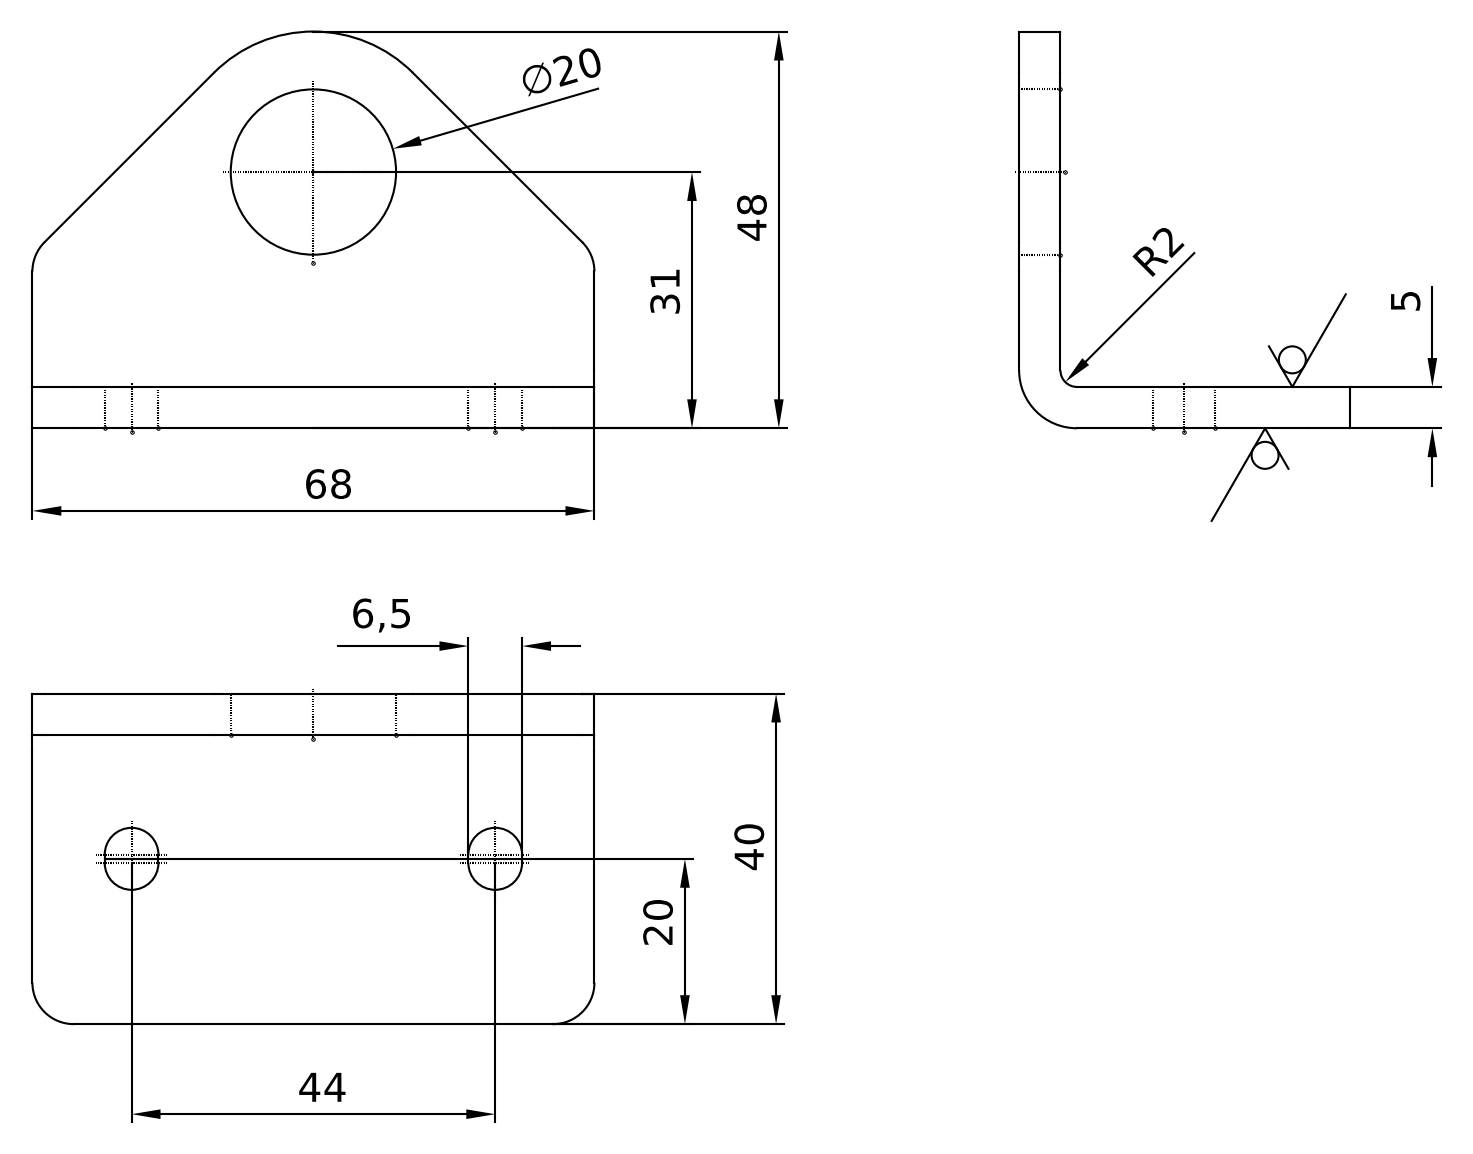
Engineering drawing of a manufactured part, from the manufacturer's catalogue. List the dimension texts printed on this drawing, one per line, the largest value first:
68
48
44
40
31
∅20
20
6,5
5
R2
